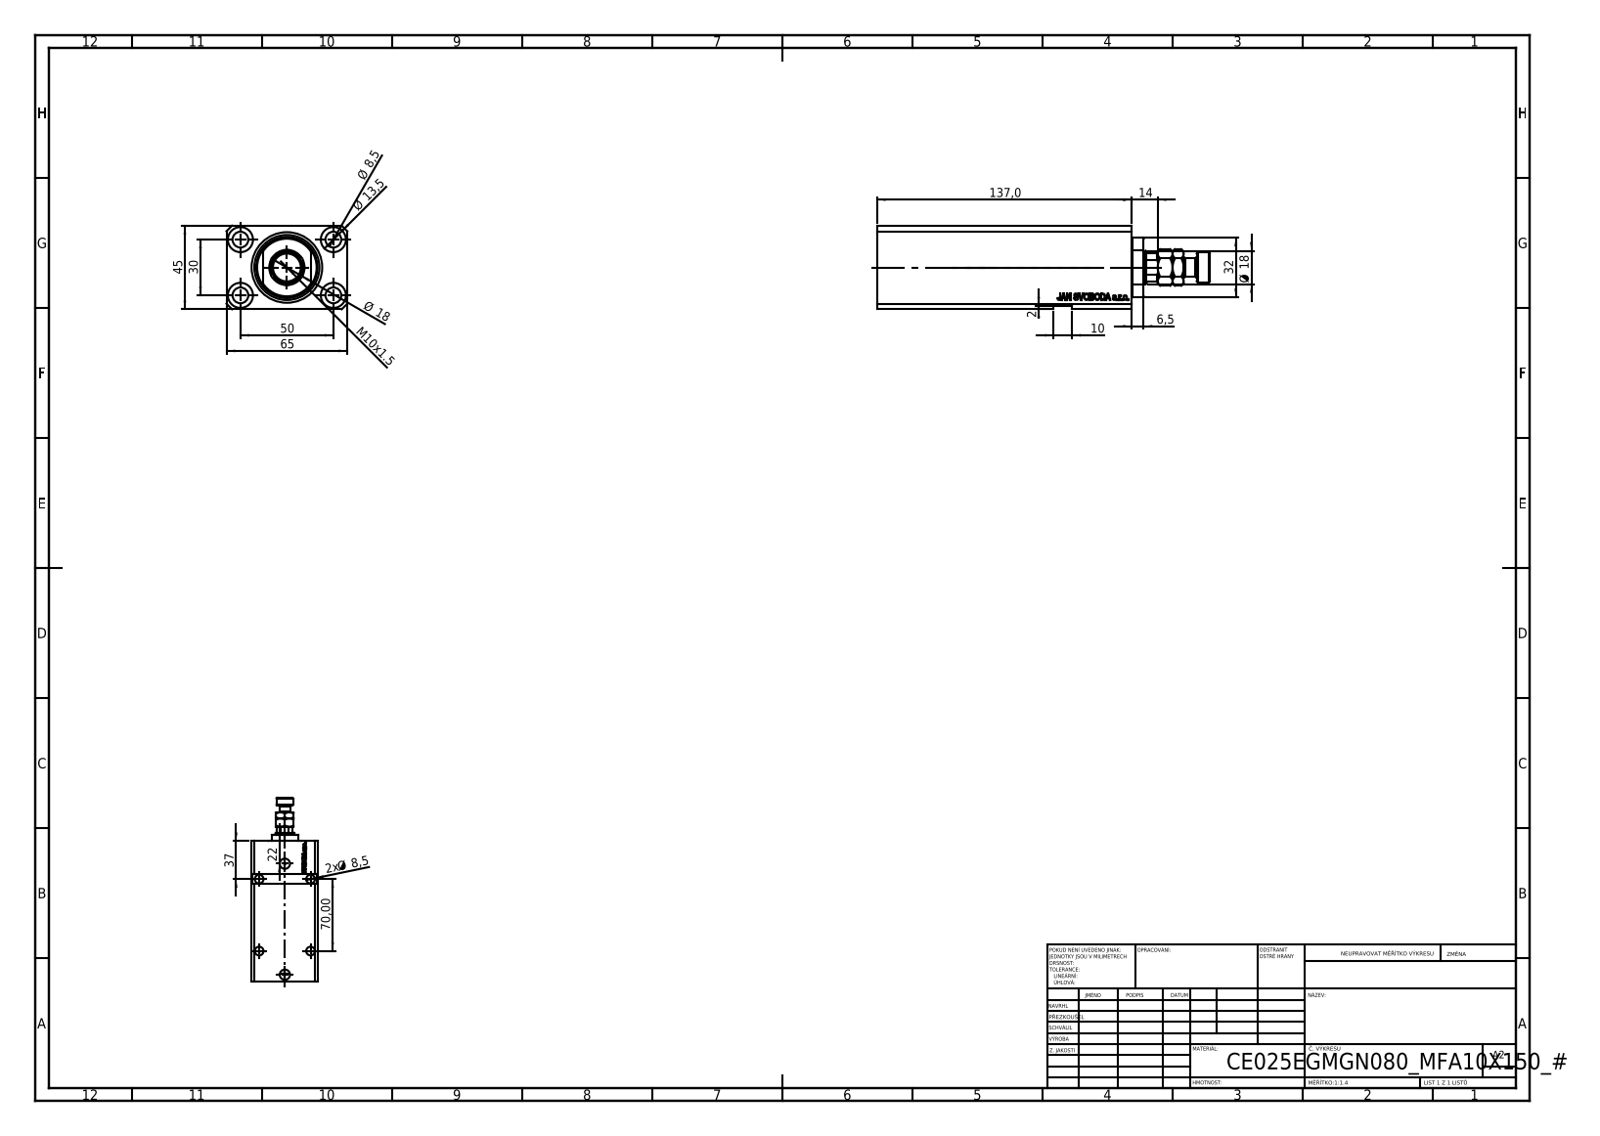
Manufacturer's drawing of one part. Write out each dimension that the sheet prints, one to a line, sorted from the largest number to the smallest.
137,0
70,00
65
50
45
37
32
30
22
Ø 18
Ø 18
14
Ø 13,5
M10x1.5
10
Ø 8,5
2x Ø 8,5
6,5
2
